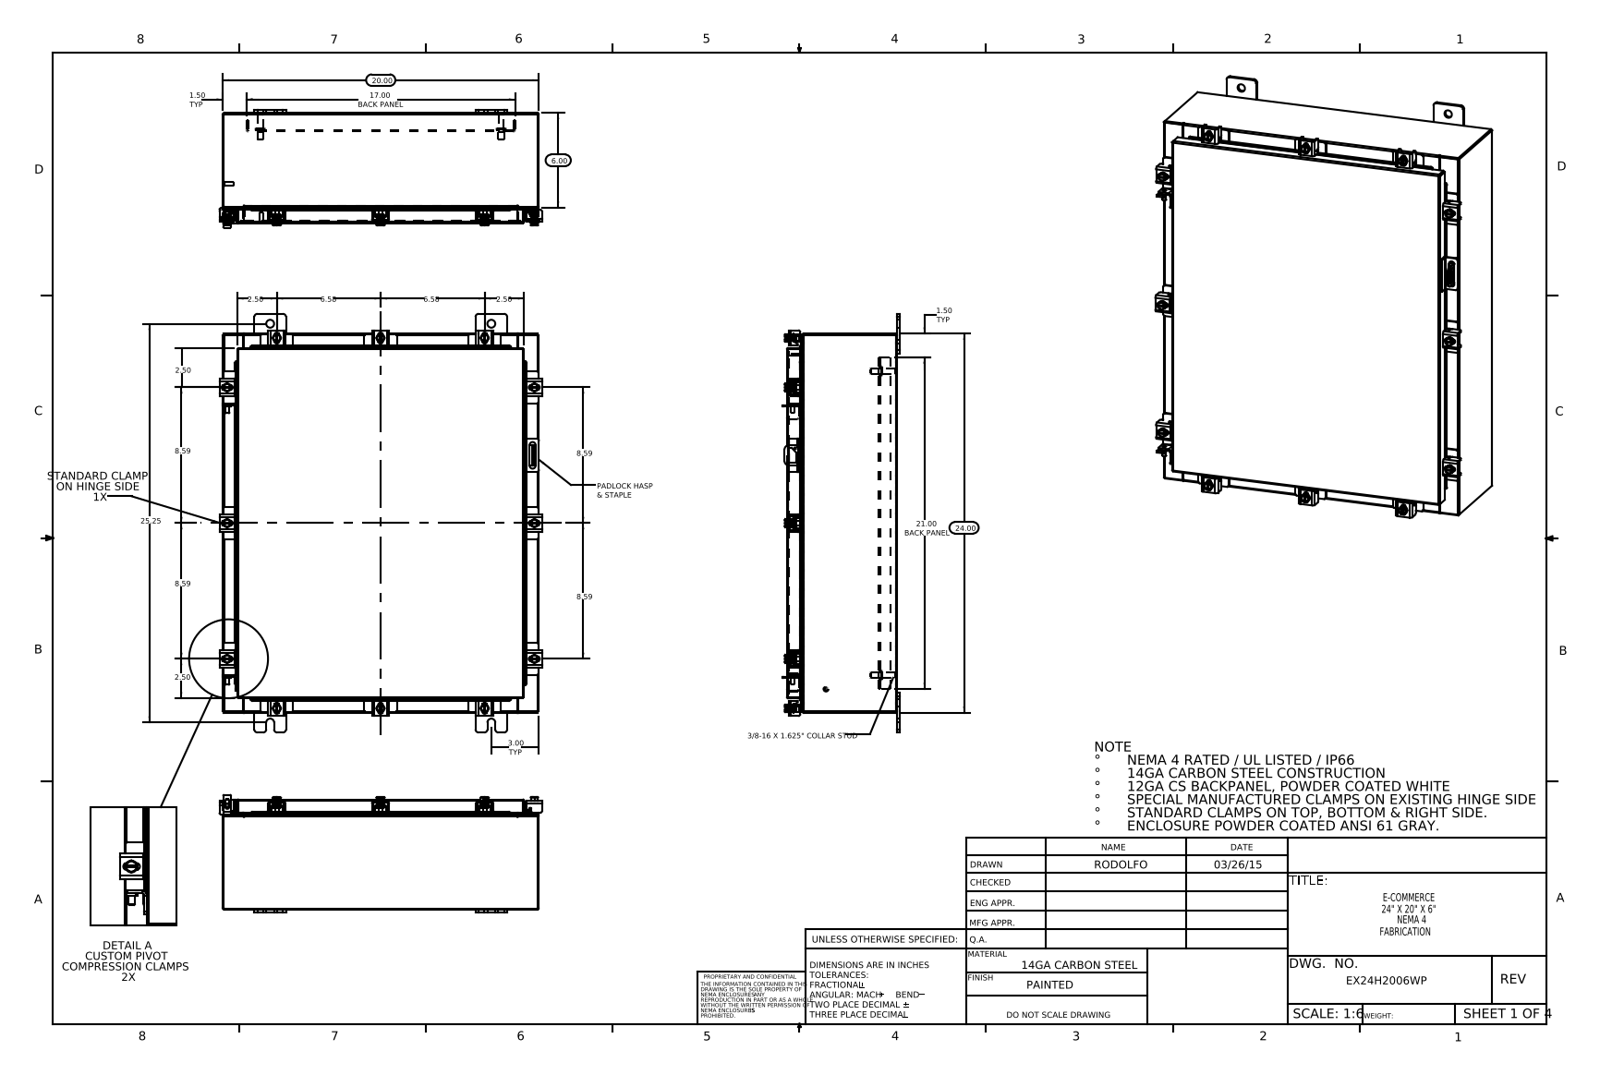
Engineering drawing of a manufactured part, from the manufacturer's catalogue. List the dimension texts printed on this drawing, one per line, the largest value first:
25.25
24.00
21.00 BACK PANEL
20.00
17.00 BACK PANEL
8.59
8.59
8.59
8.59
6.58
6.58
6.00
3.00 TYP
2.50
2.50
2.50
2.50
1.50 TYP
1.50 TYP
